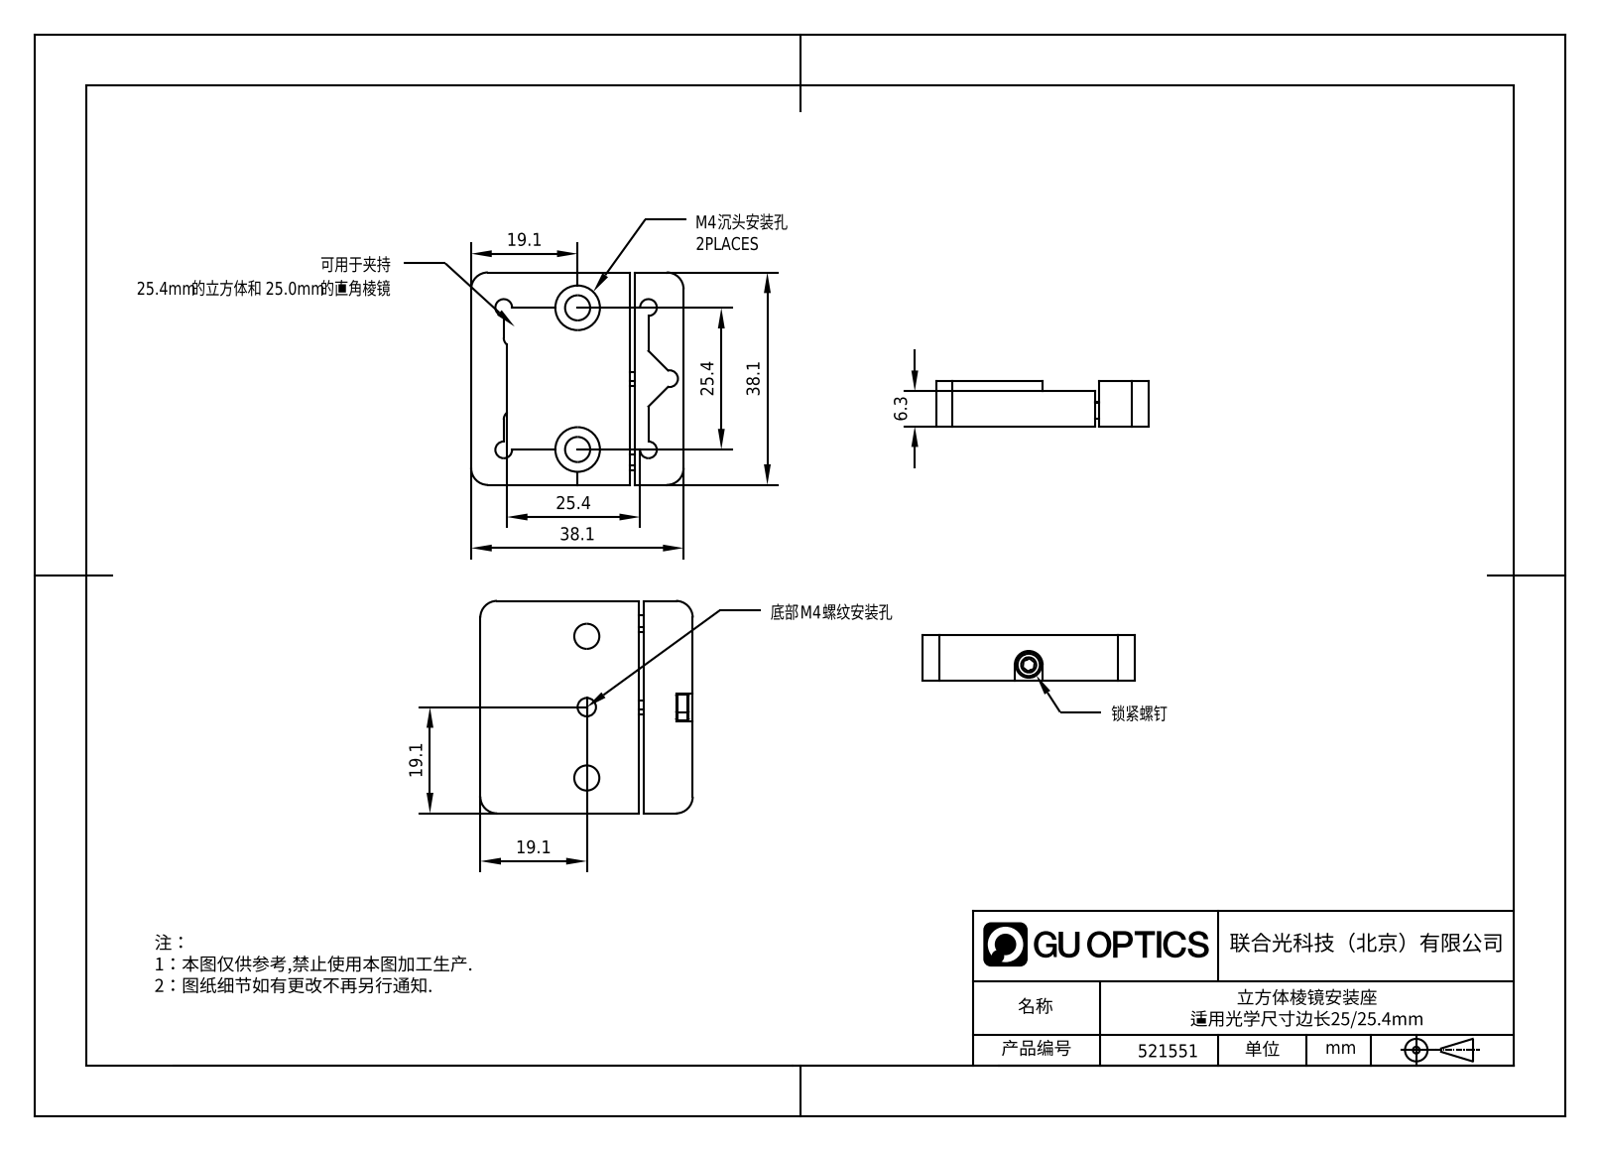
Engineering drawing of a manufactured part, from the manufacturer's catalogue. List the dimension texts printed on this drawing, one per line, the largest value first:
38.1
38.1
25.4
25.4
19.1
19.1
19.1
6.3
